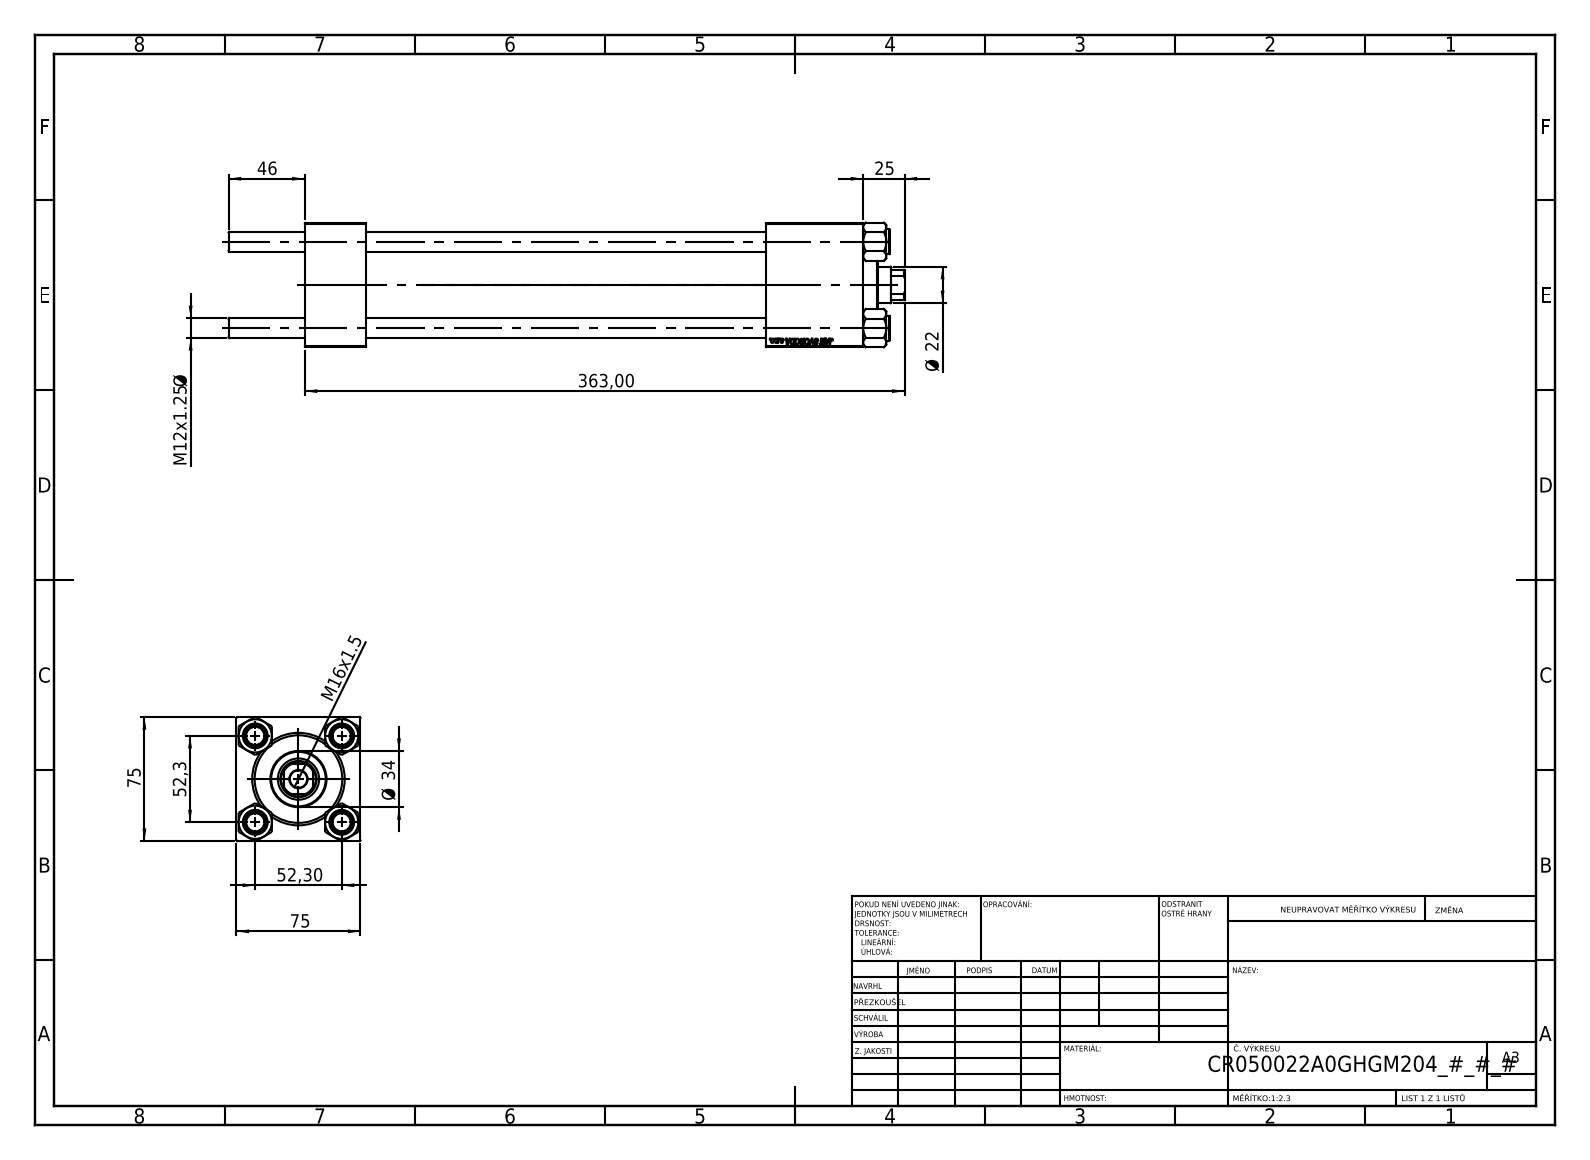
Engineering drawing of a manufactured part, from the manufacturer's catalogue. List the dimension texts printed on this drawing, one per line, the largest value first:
363,00
75
75
52,3
52,30
46
Ø 34
25
Ø 22
M16x1.5
M12x1.25 Ø
